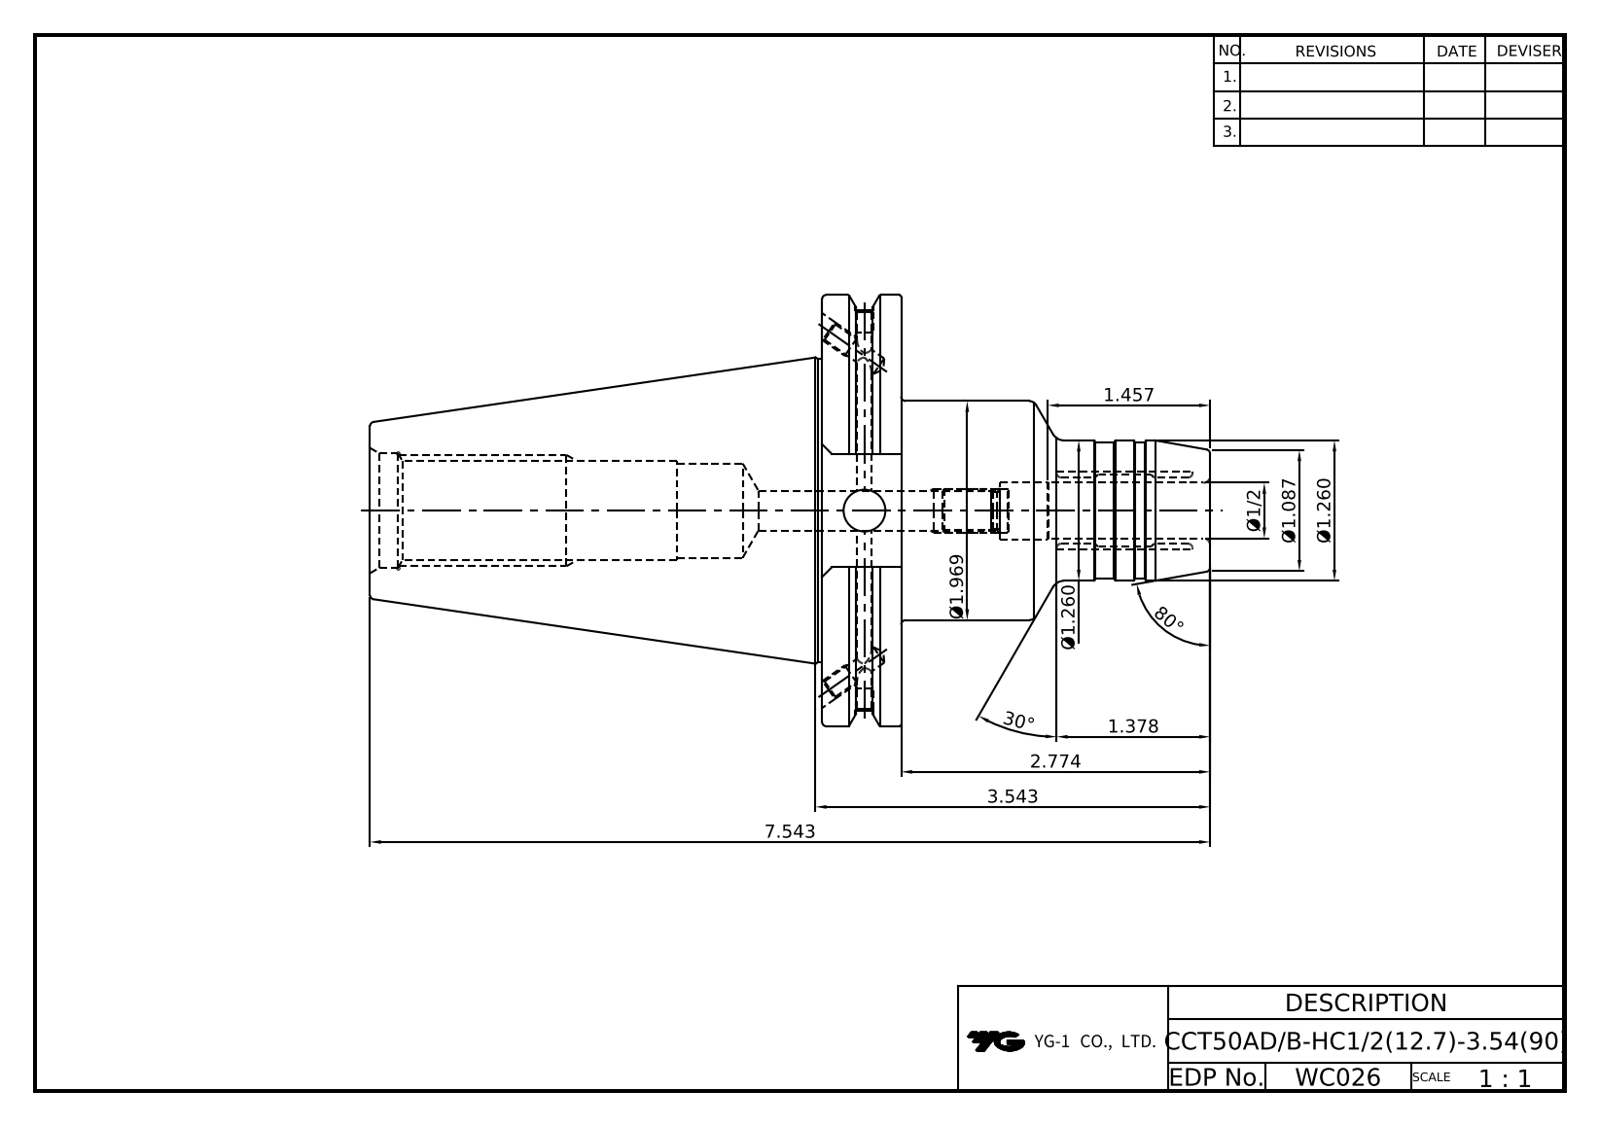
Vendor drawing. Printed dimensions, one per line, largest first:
80°
30°
7.543
3.543
2.774
Ø1.969
1.457
1.378
Ø1.260
Ø1.260
Ø1.087
Ø1/2
